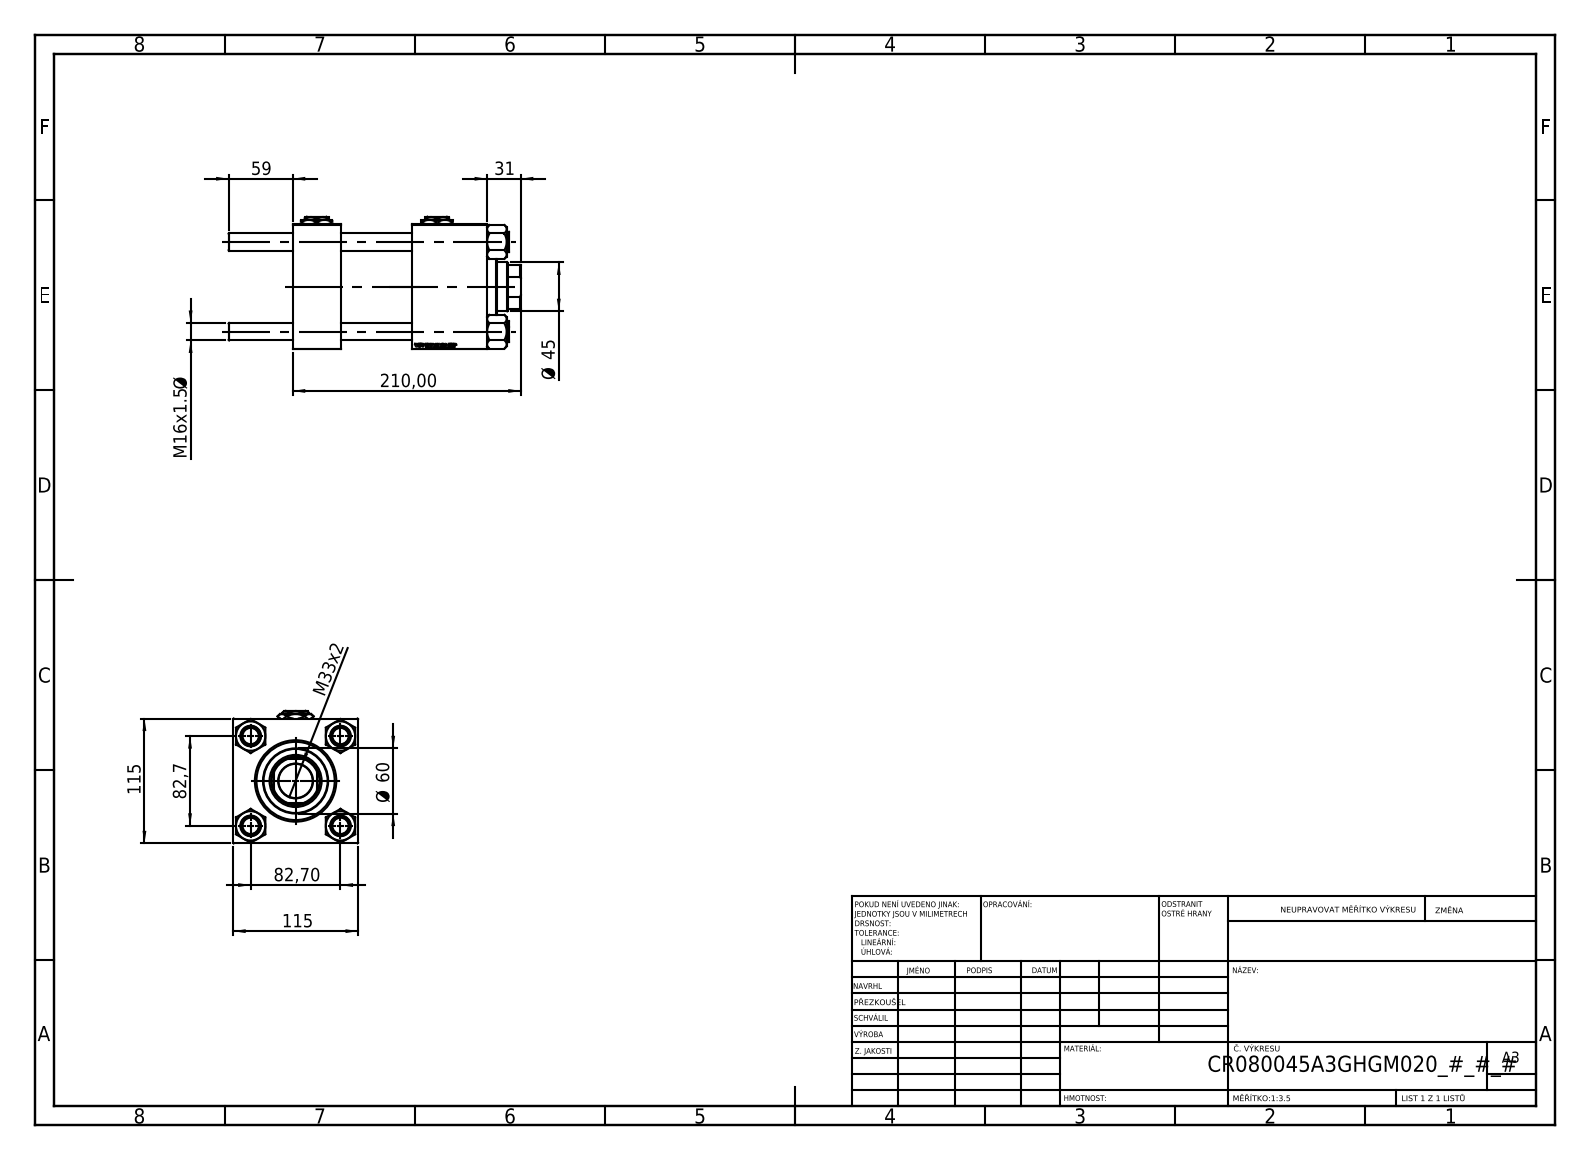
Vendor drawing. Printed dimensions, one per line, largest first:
210,00
115
115
82,7
82,70
Ø 60
59
Ø 45
M33x2
31
M16x1.5 Ø
